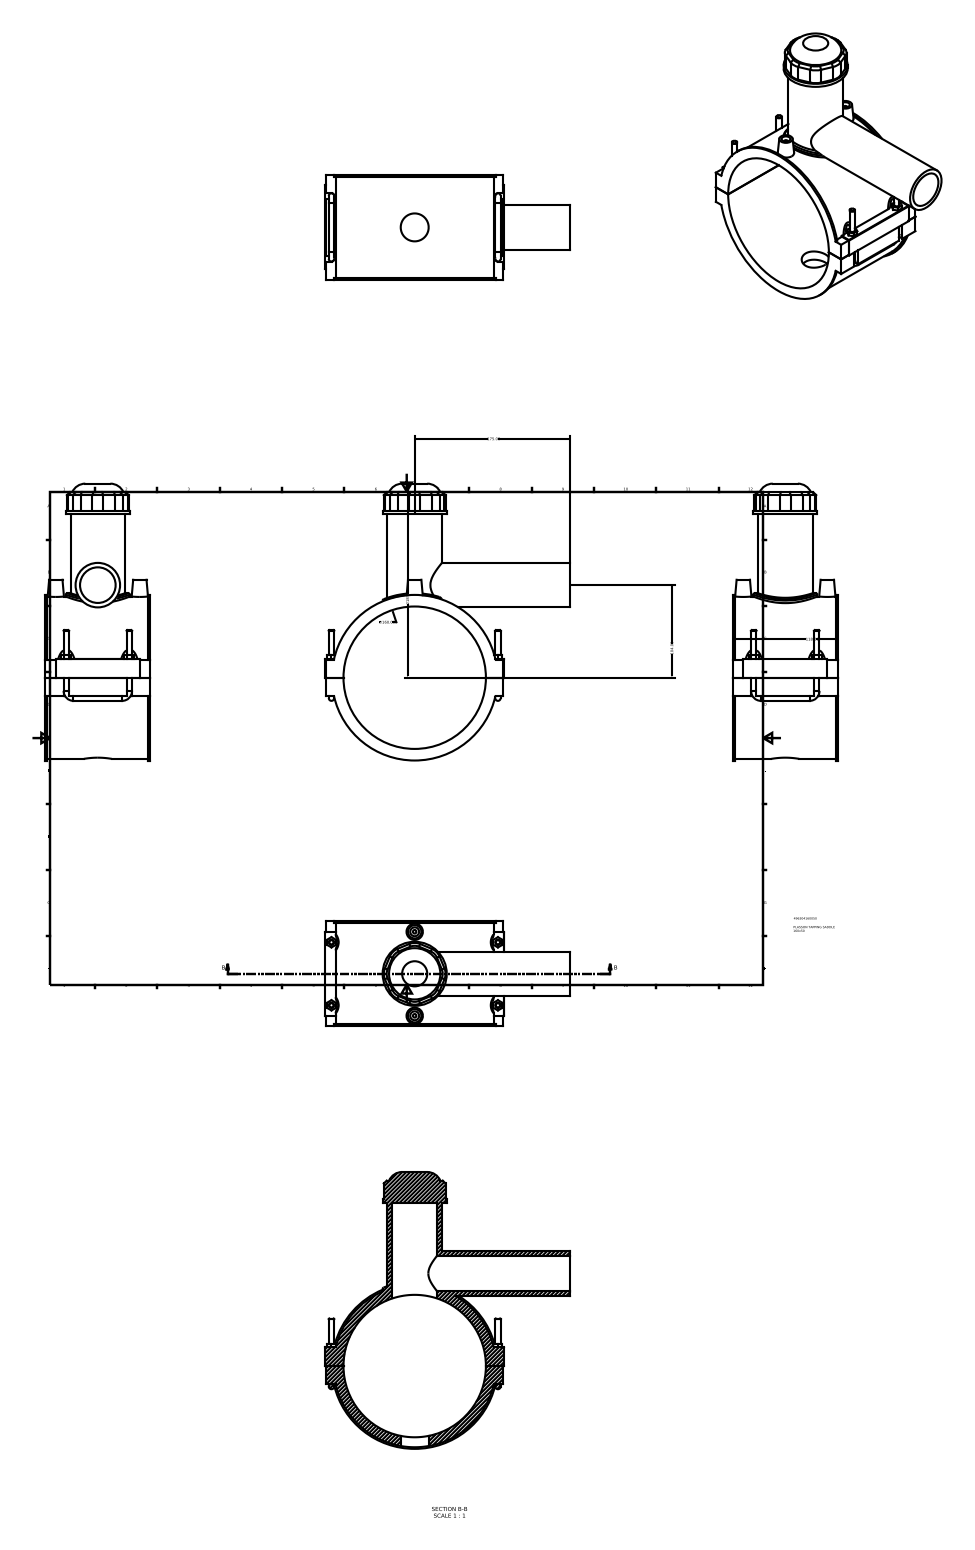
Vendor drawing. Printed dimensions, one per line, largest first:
218.00
175.00
∅160.00
118.00
104.00
